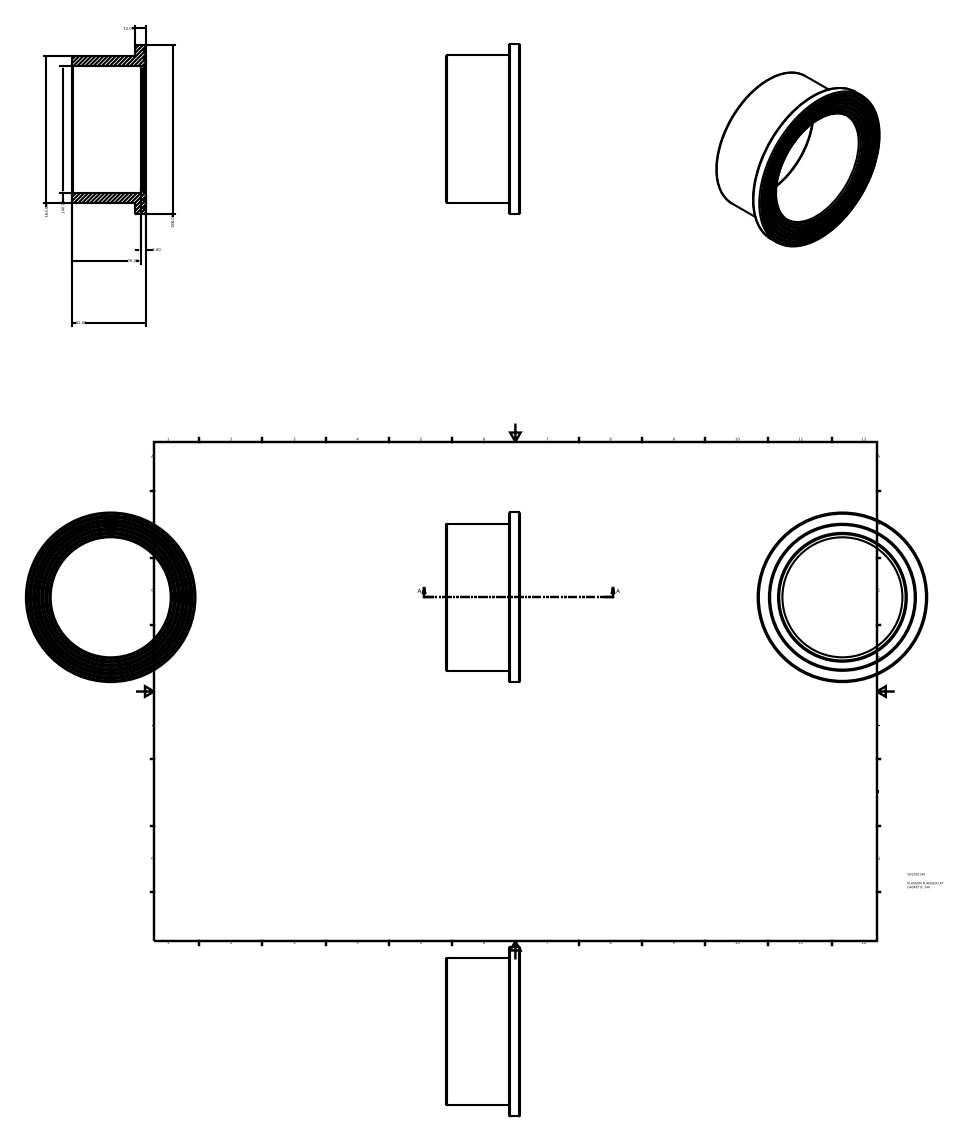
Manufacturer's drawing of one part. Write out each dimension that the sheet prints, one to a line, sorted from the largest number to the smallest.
188.00
163.00
140.00
82.00
76.00
12.00
6.00
